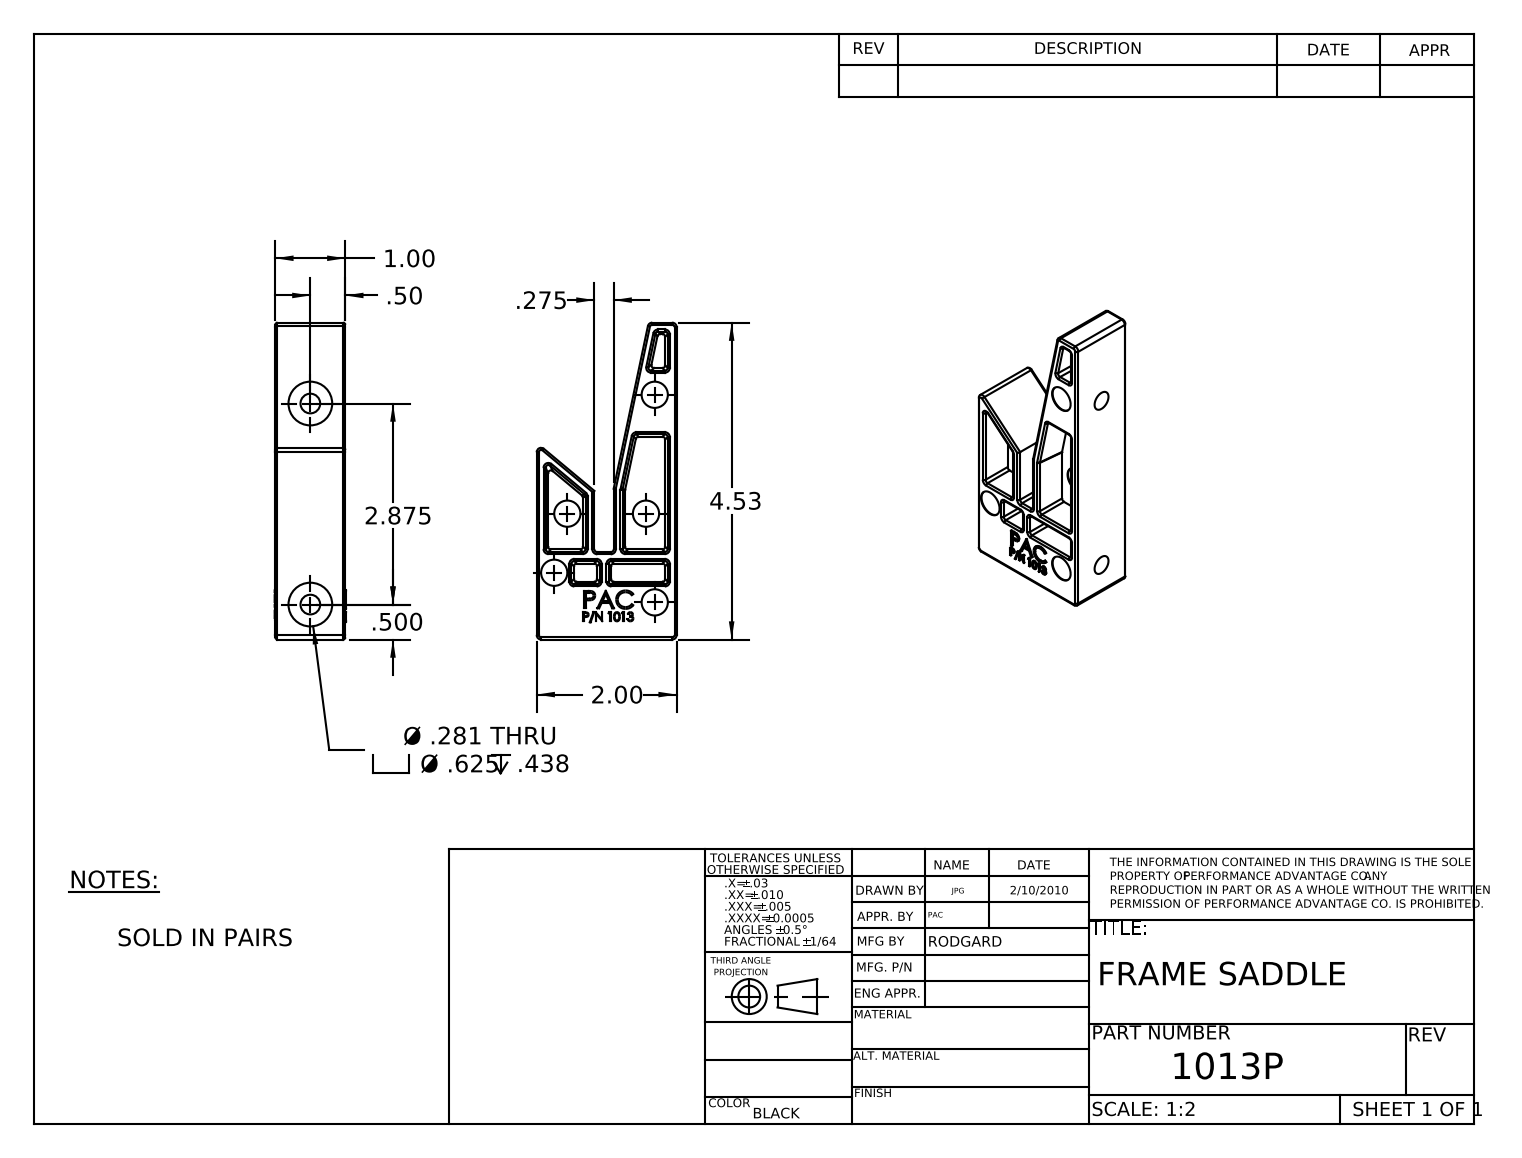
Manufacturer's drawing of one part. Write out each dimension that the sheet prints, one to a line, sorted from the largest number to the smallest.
4.53
2.875
2.00
1.00
Ø .625 .438 Ø .281 THRU
.50
.500
.275
